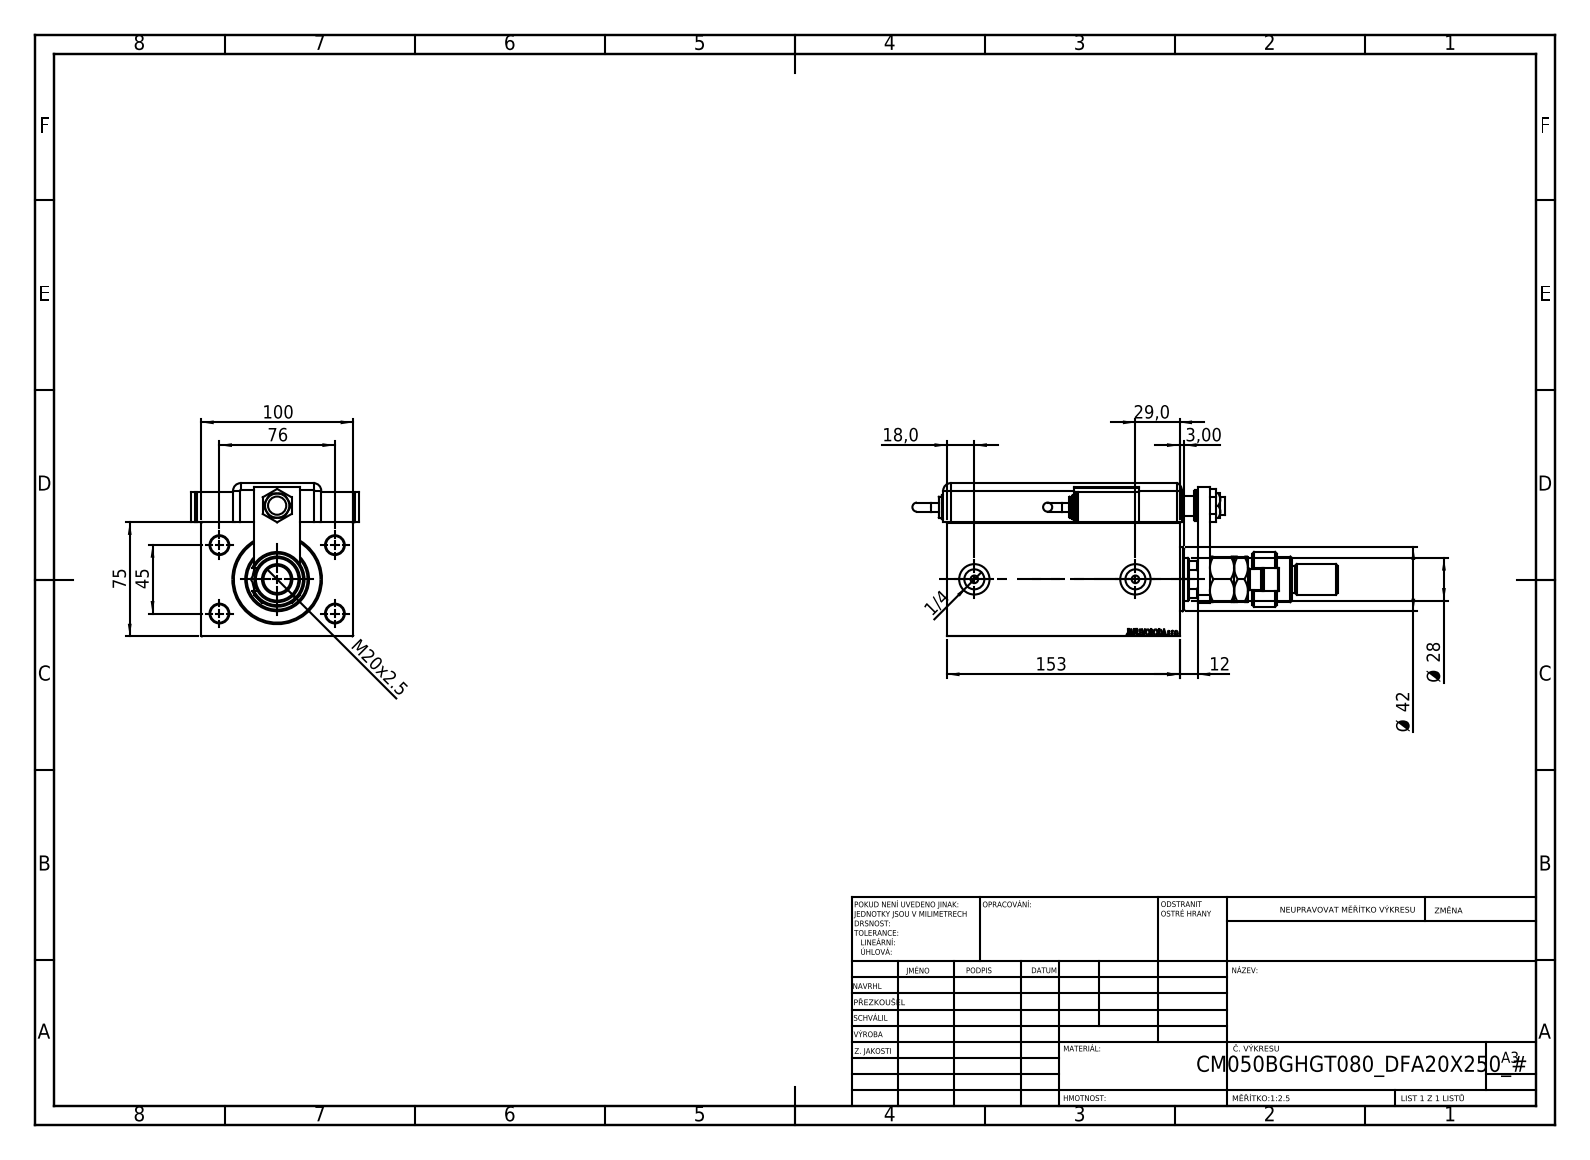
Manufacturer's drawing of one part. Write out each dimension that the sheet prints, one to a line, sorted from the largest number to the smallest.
153
100
76
75
45
Ø 42
29,0
Ø 28
M20x2.5
18,0
12
3,00
1/4
